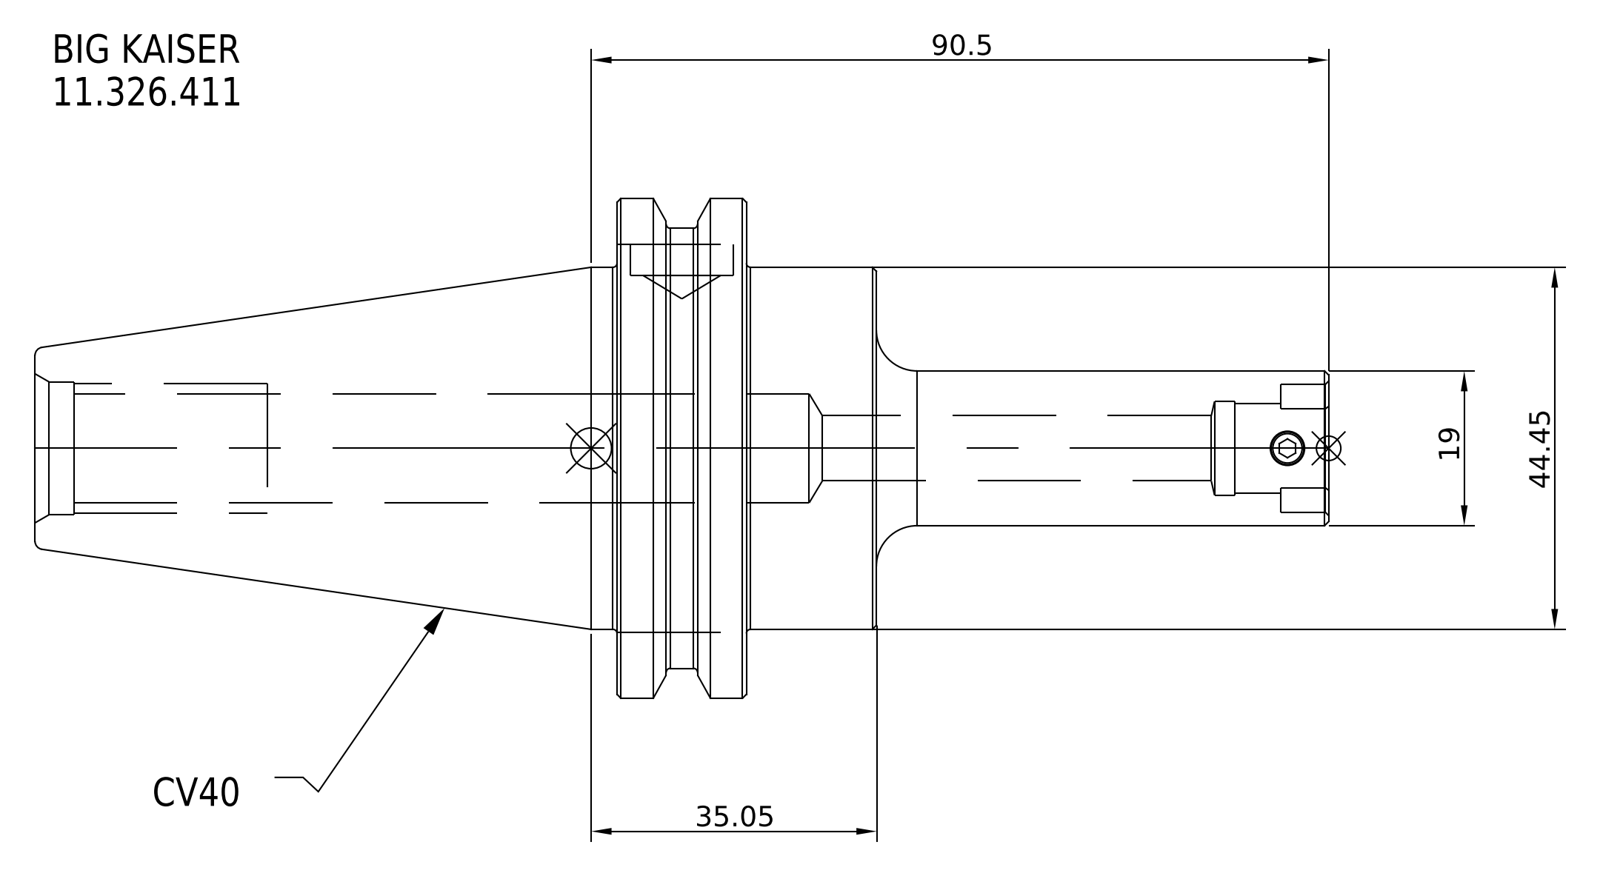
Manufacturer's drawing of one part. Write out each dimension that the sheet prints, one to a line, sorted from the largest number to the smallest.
90.5
44.45
35.05
19
